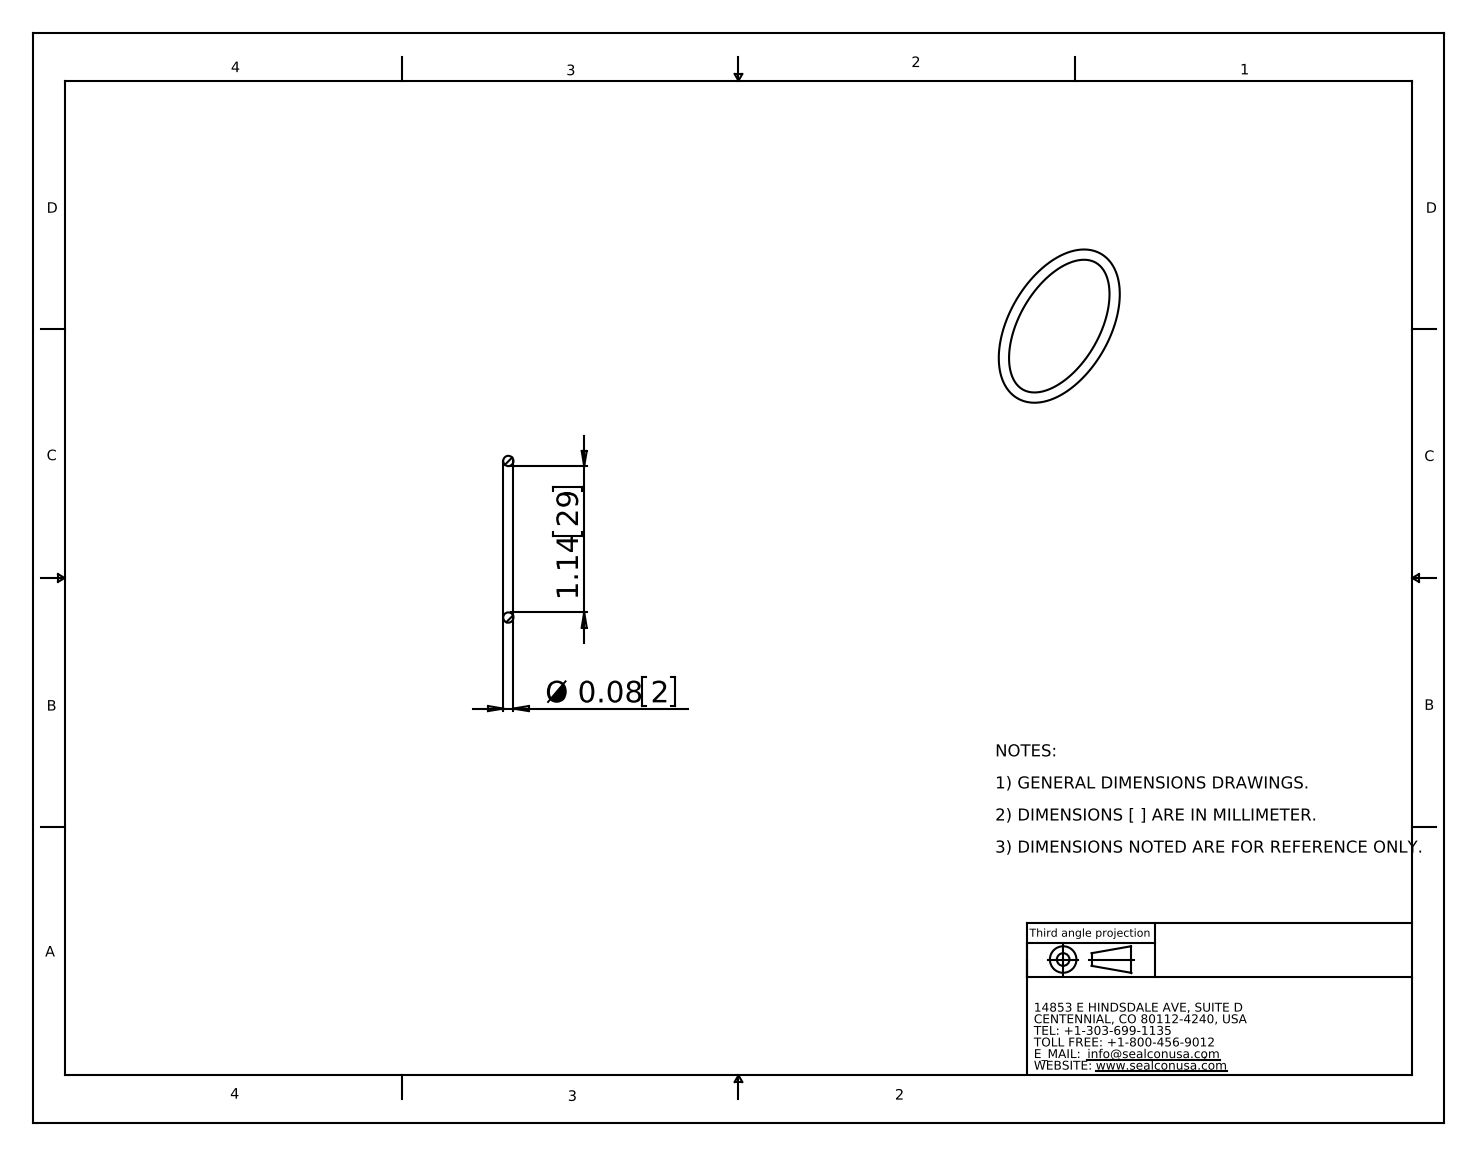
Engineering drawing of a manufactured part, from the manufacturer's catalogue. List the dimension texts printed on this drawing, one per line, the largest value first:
1.14 29
Ø 0.08 2
